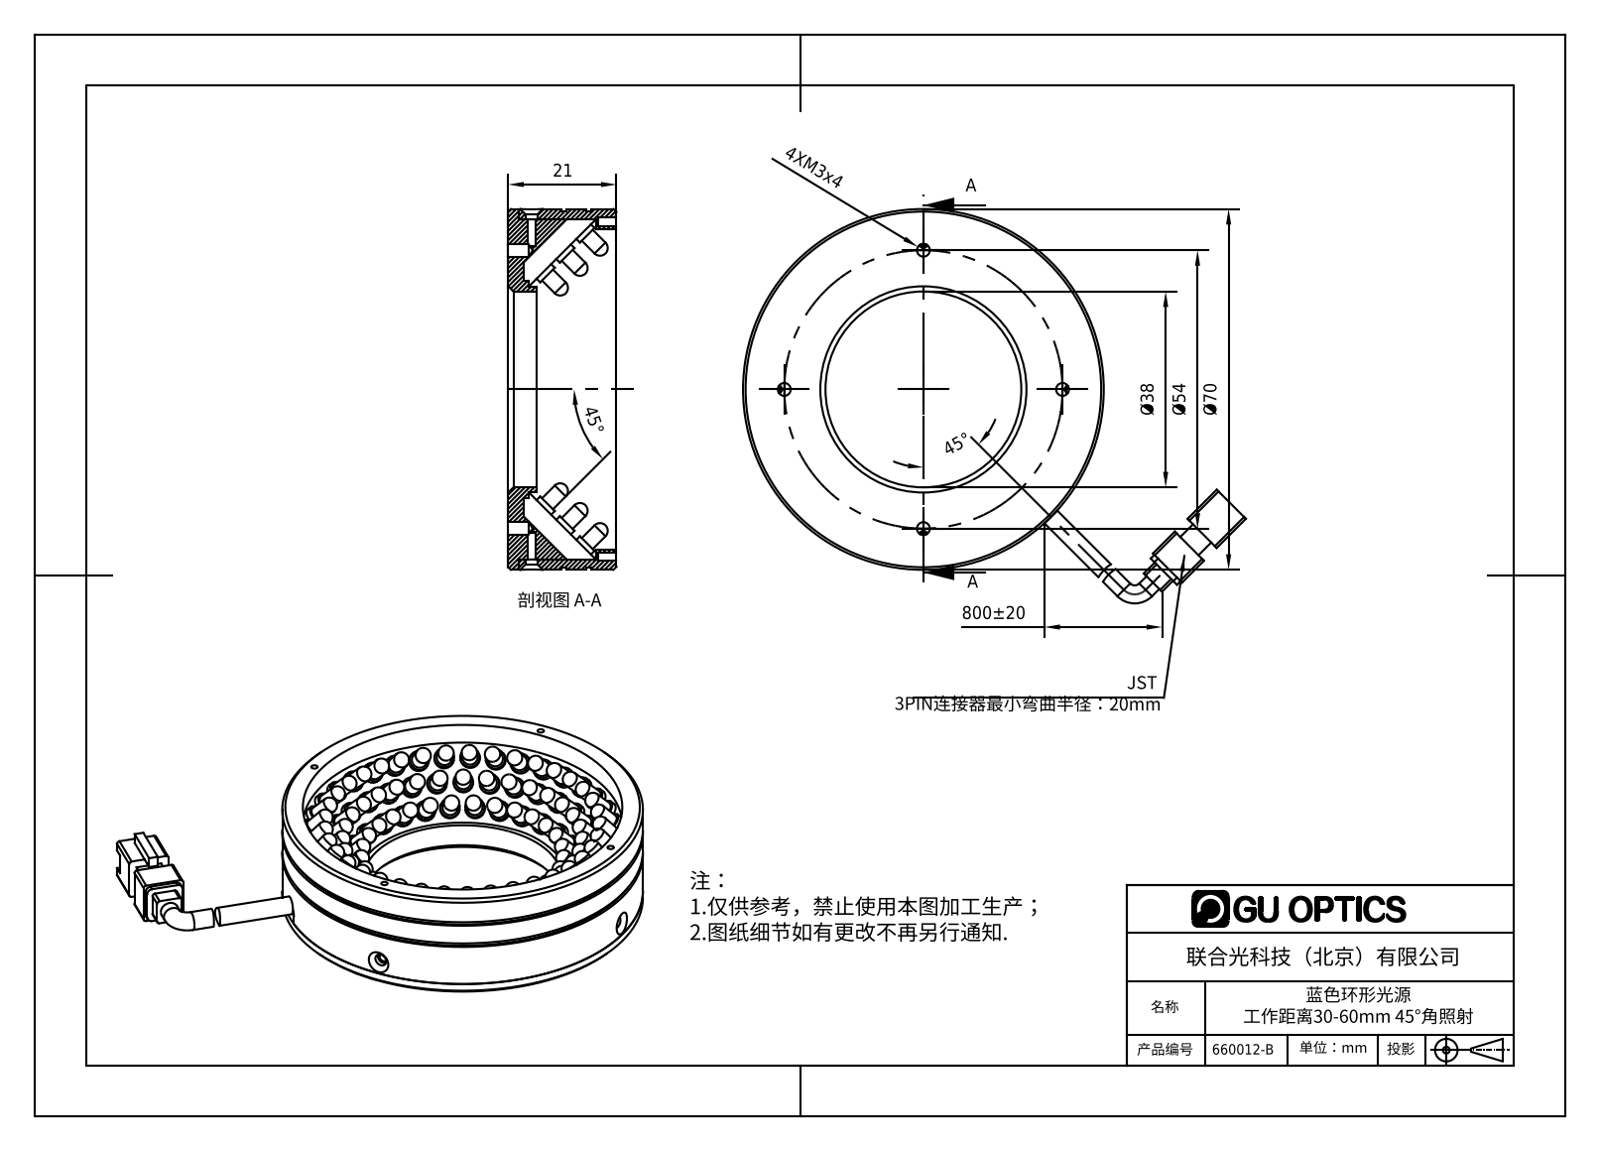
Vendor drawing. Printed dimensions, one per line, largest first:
800±20
Ø70
Ø54
45°
45°
Ø38
21
4XM3x4
